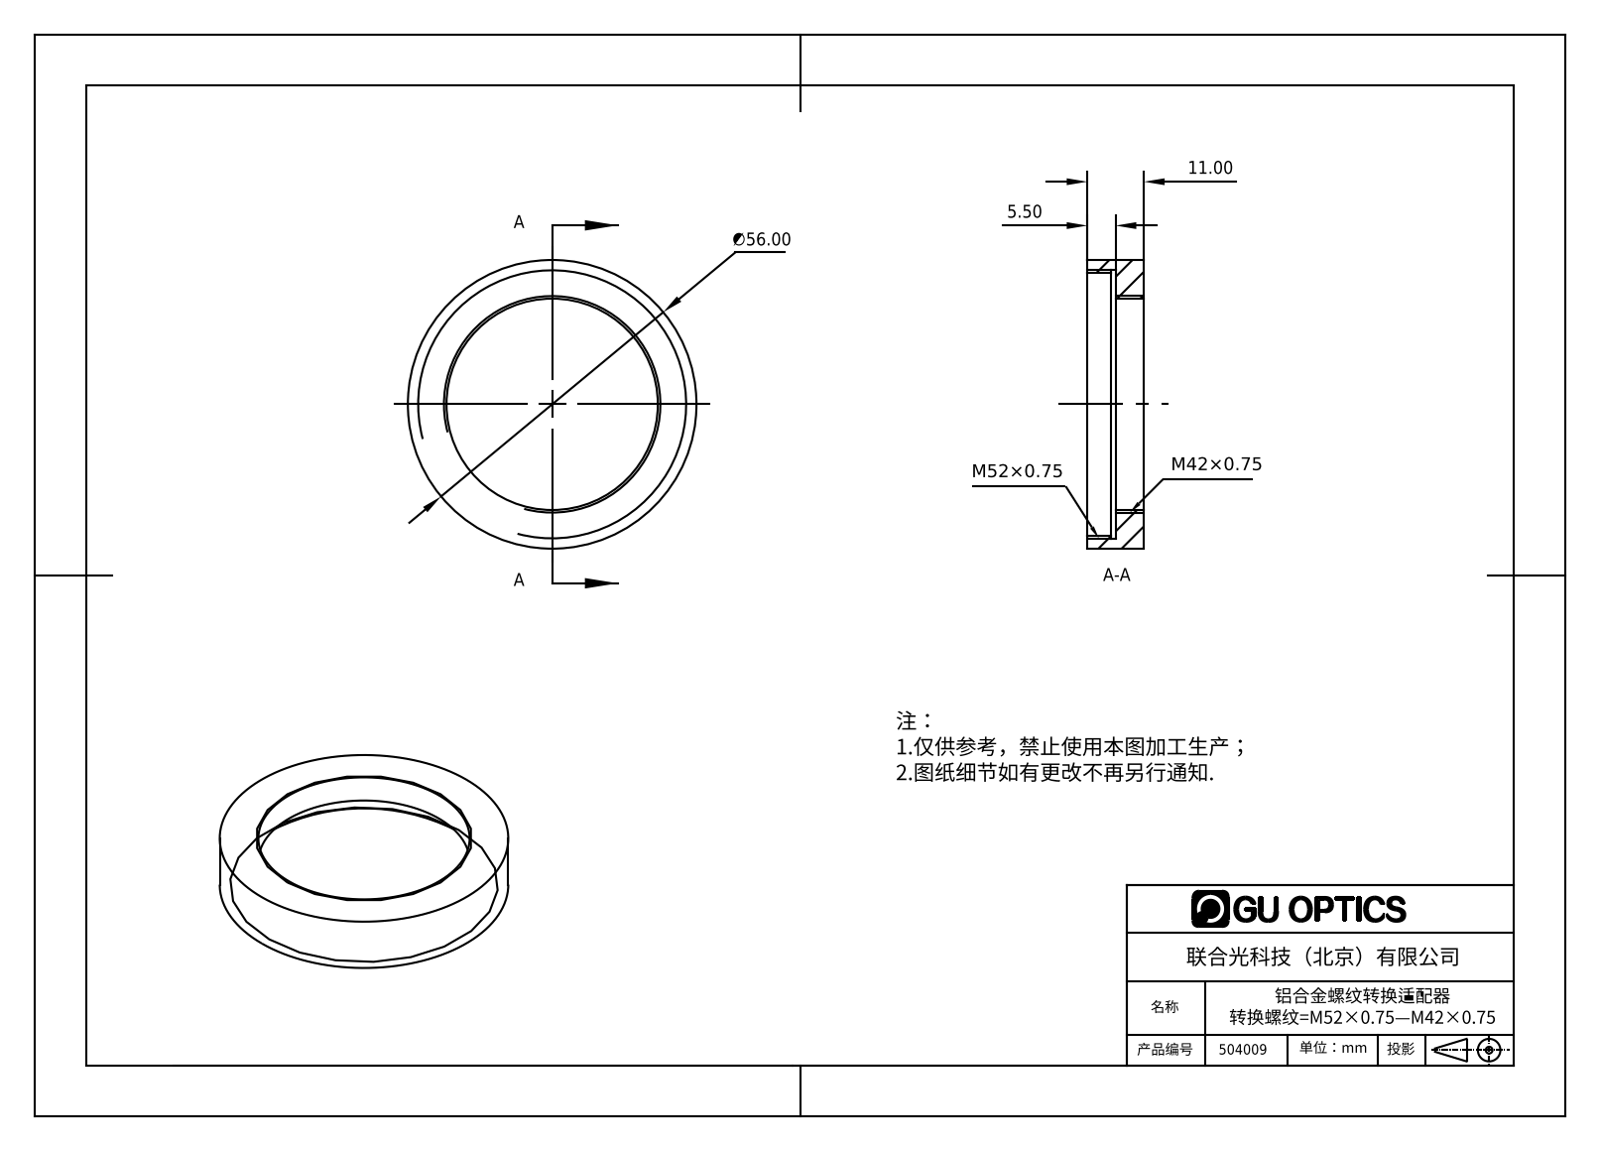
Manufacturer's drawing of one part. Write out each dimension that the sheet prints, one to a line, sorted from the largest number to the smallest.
∅56.00
11.00
5.50
